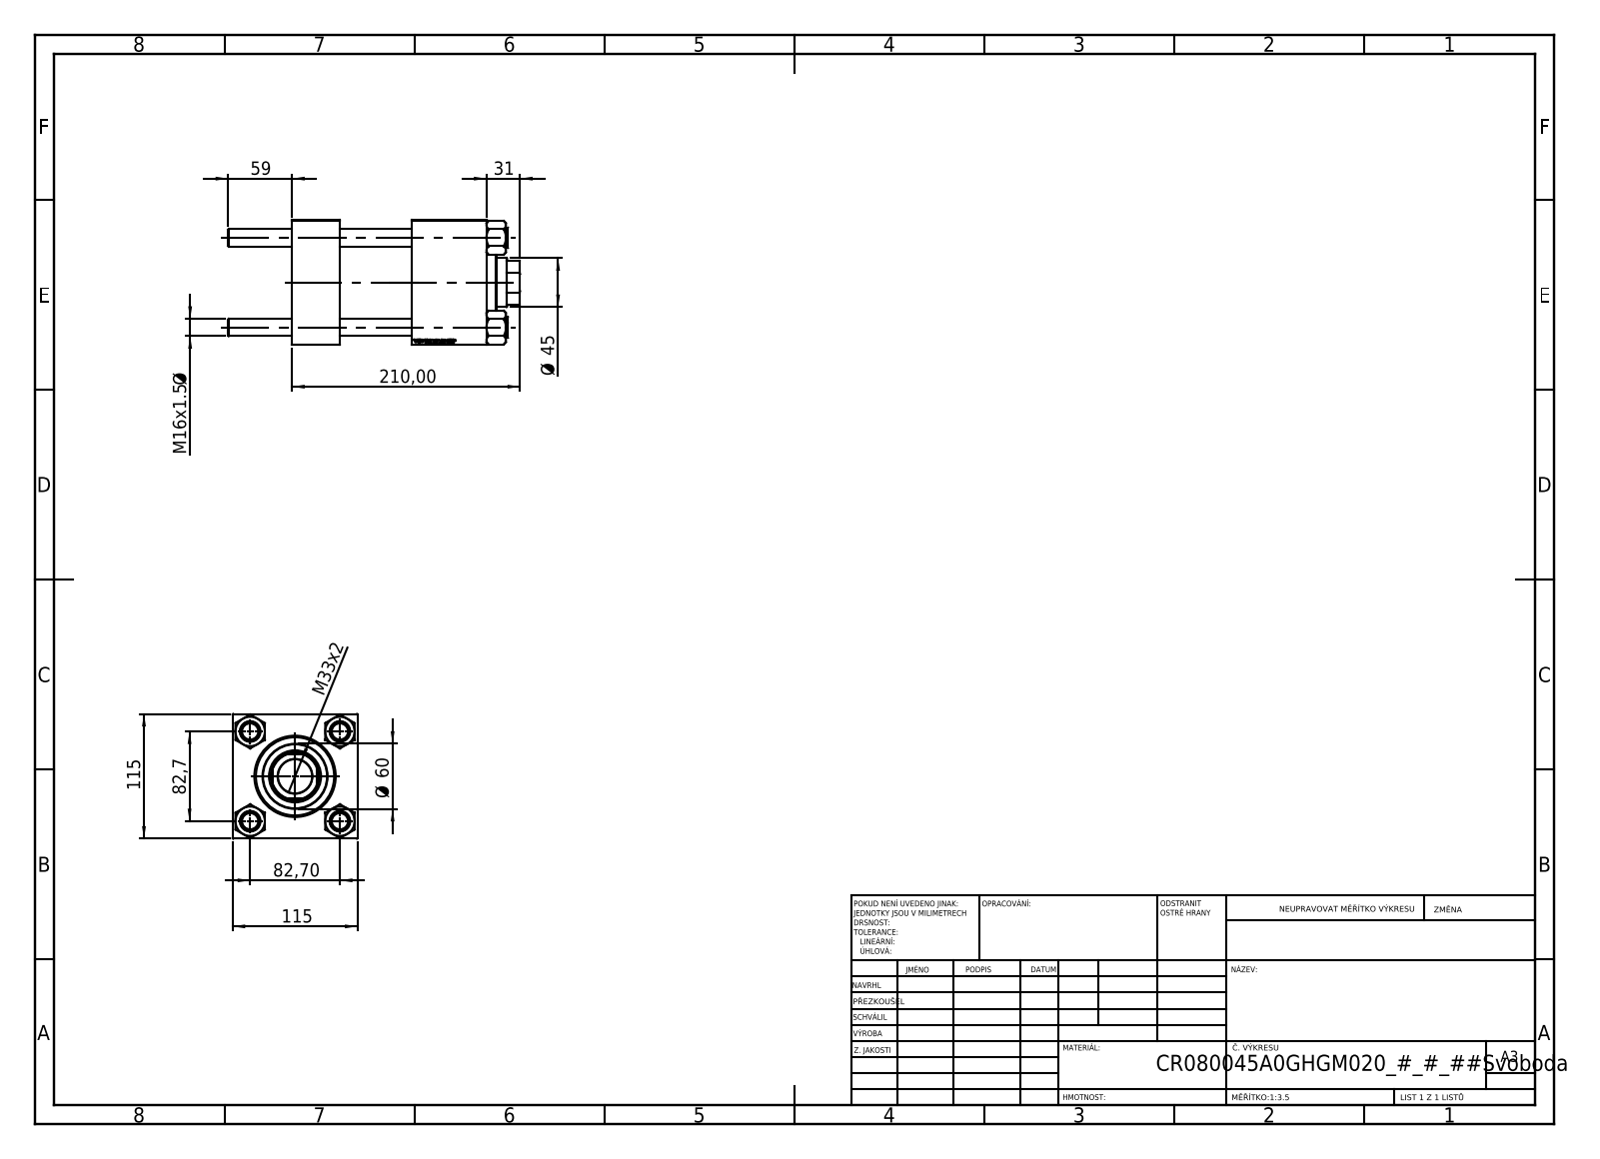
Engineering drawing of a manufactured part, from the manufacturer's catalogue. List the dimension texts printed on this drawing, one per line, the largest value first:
210,00
115
115
82,7
82,70
Ø 60
59
Ø 45
M33x2
31
M16x1.5 Ø
